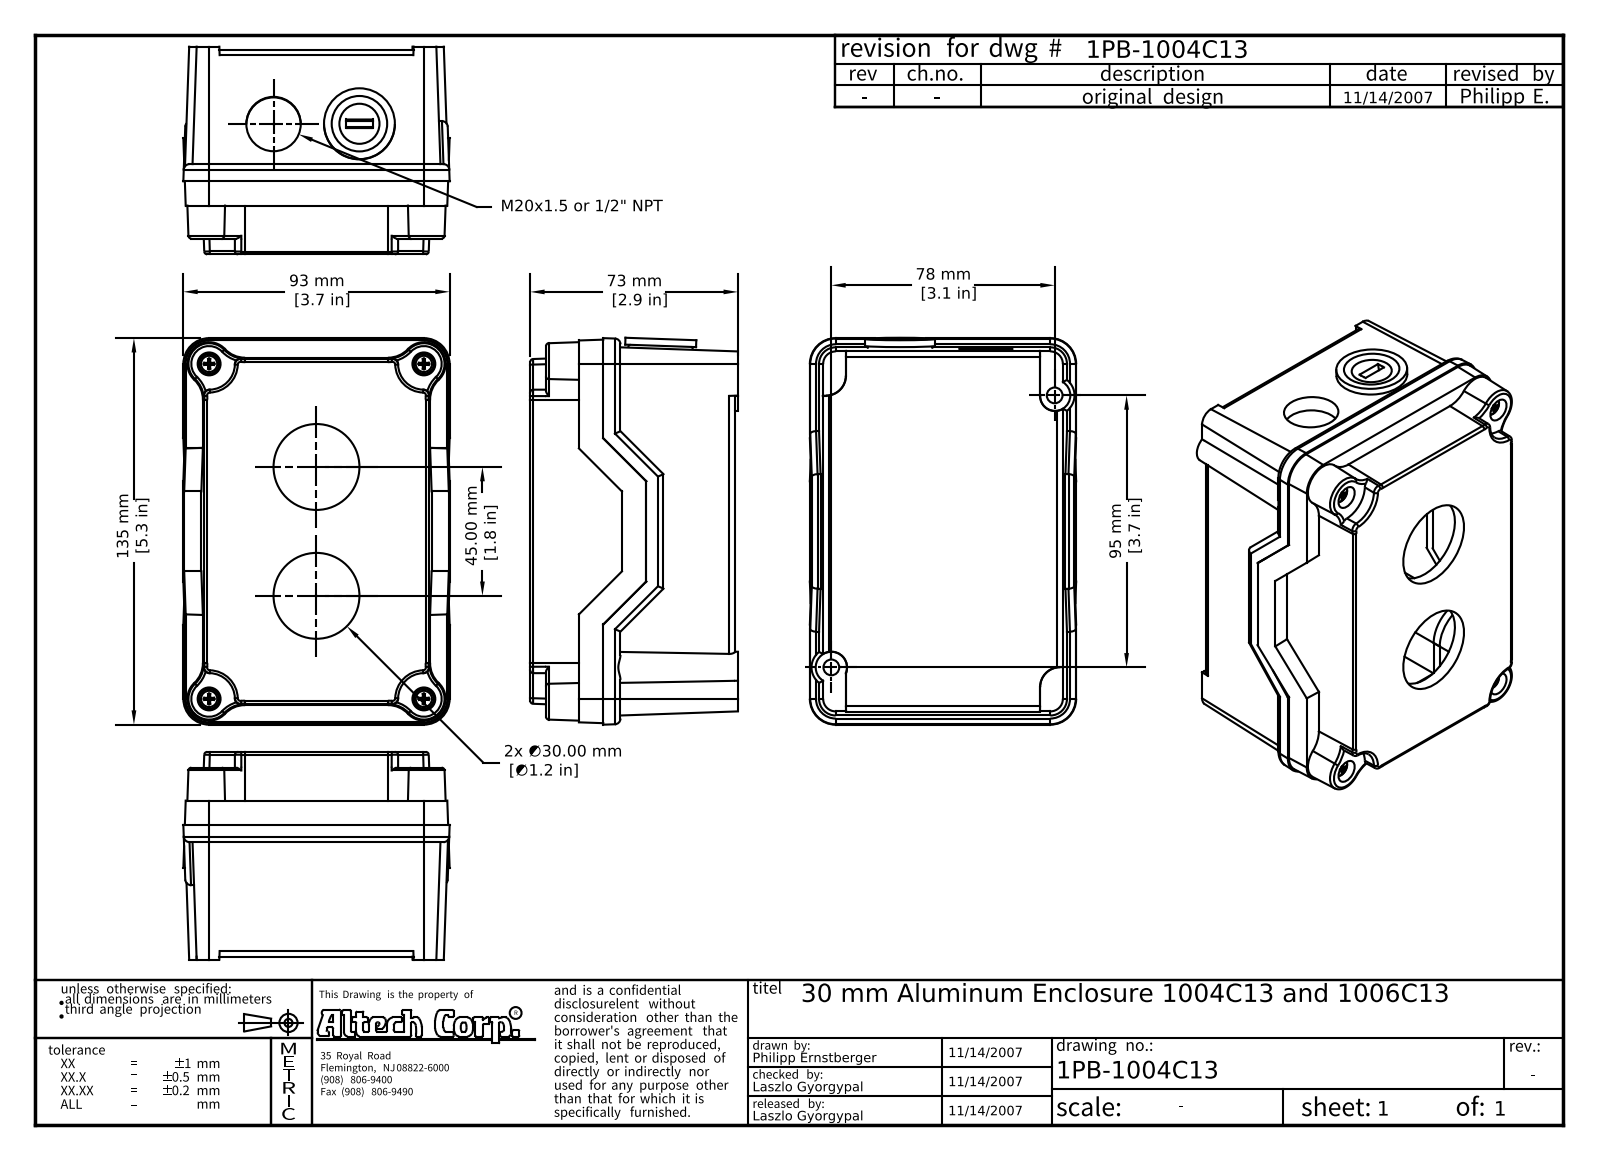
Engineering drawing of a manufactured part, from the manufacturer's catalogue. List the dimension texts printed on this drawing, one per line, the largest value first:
135 mm [5.3 in]
95 mm [3.7 in]
93 mm [3.7 in]
78 mm [3.1 in]
73 mm [2.9 in]
45.00 mm [1.8 in]
2x ∅30.00 mm [∅1.2 in]
M20x1.5 or 1/2" NPT
